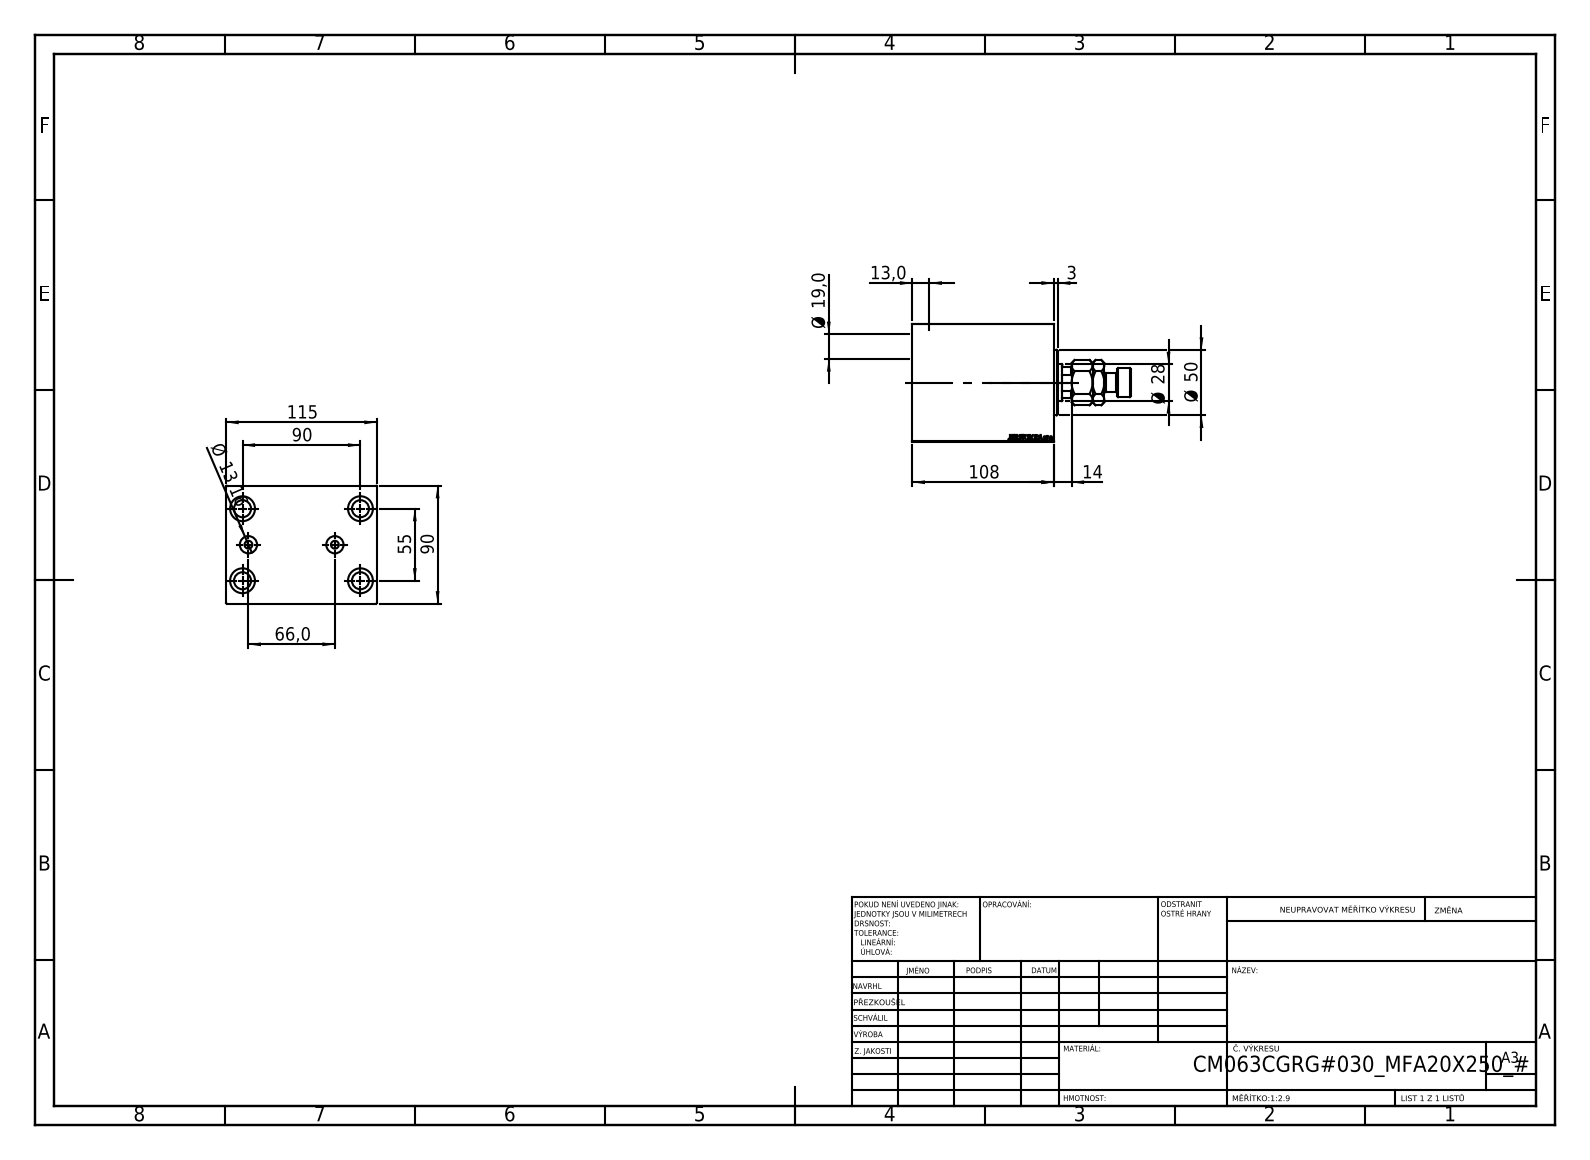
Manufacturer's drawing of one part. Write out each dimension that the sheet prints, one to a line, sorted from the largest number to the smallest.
115
108
90
90
66,0
55
Ø 50
Ø 28
Ø 19,0
14
Ø 13,16
13,0
3
